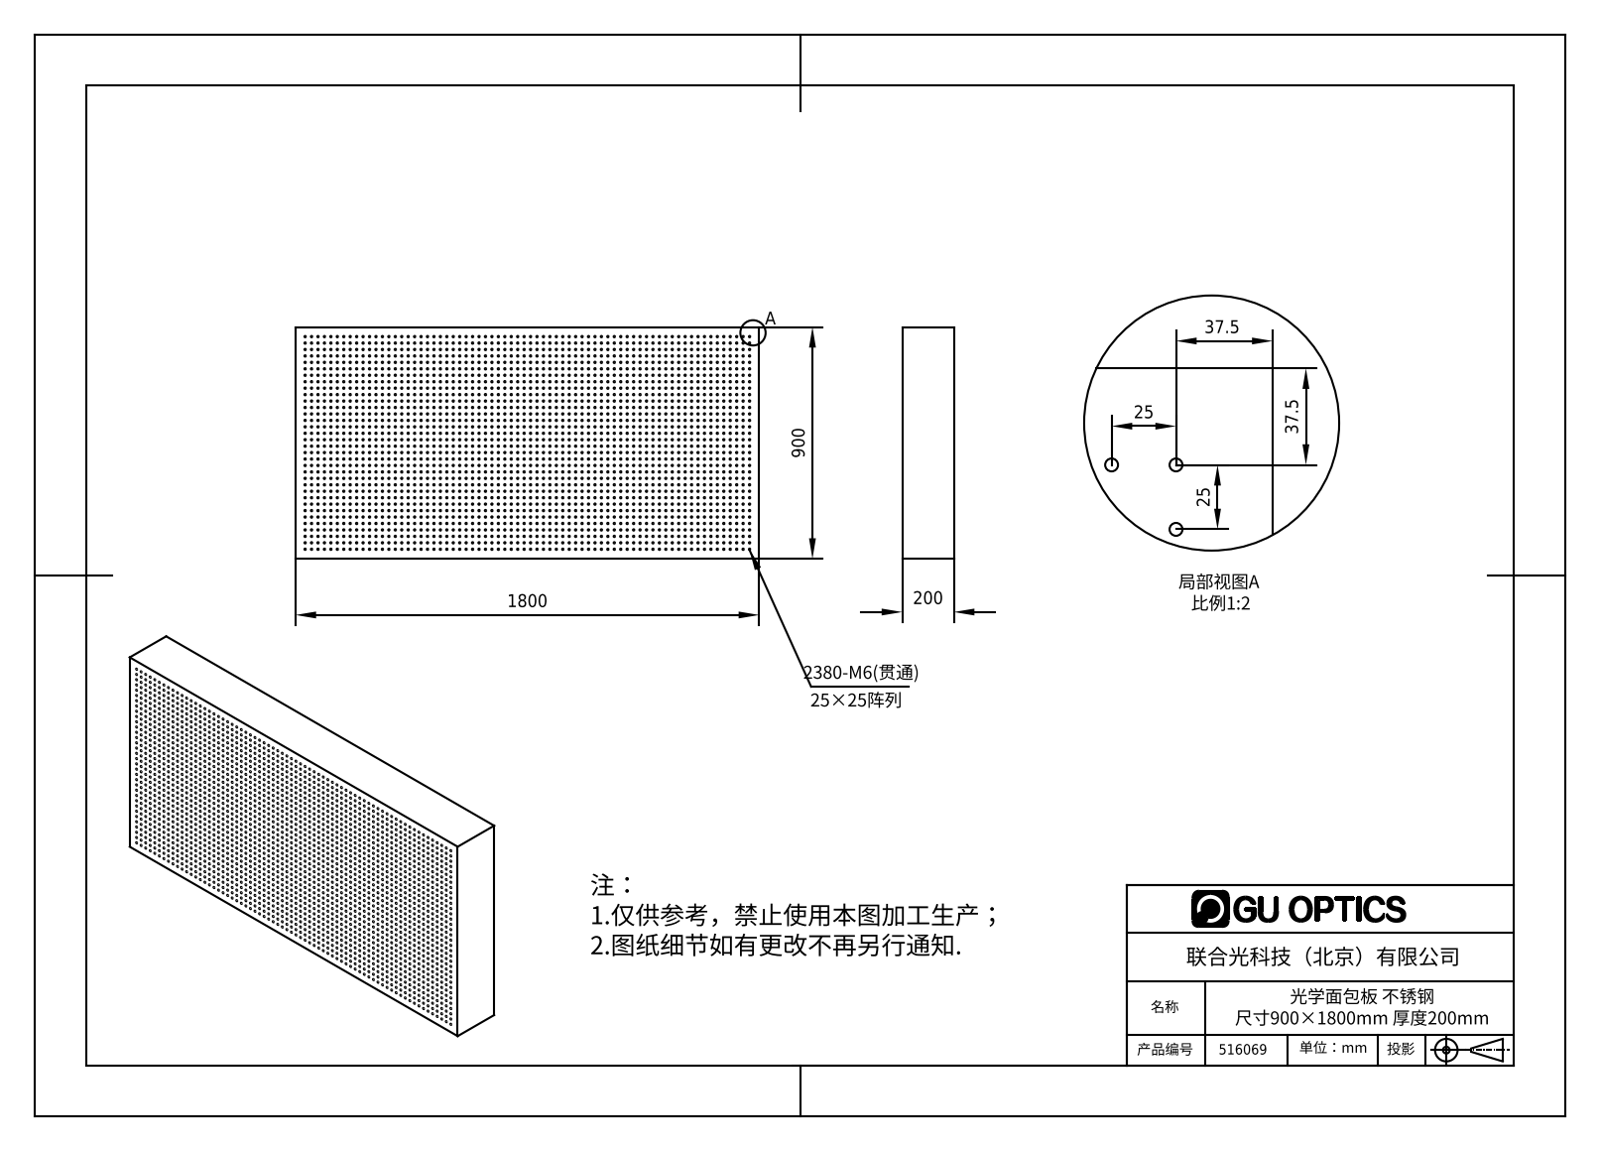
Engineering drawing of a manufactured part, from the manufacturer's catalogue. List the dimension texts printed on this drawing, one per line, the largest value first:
1800
900
200
37.5
37.5
25
25
